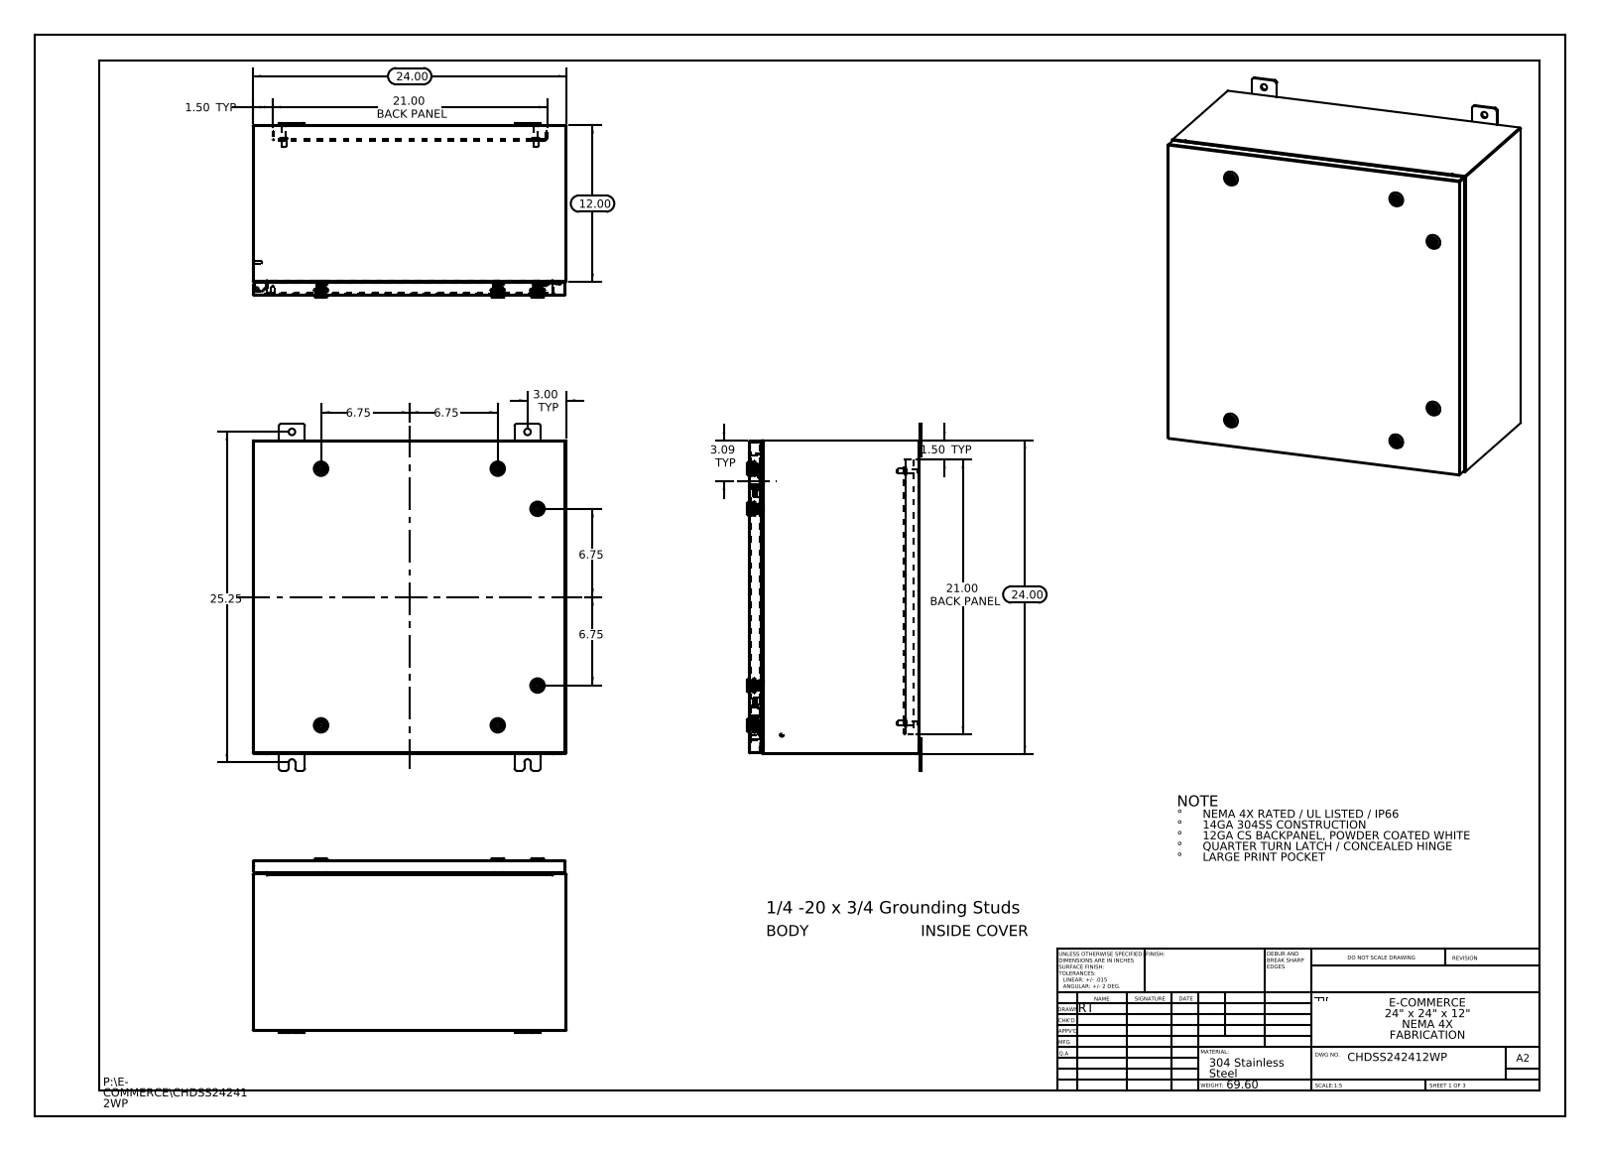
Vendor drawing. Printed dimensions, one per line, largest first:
25.25
24.00
24.00
21.00 BACK PANEL
21.00 BACK PANEL
12.00
6.75
6.75
6.75
6.75
3.09 TYP
3.00 TYP
1.50 TYP
1.50 TYP
